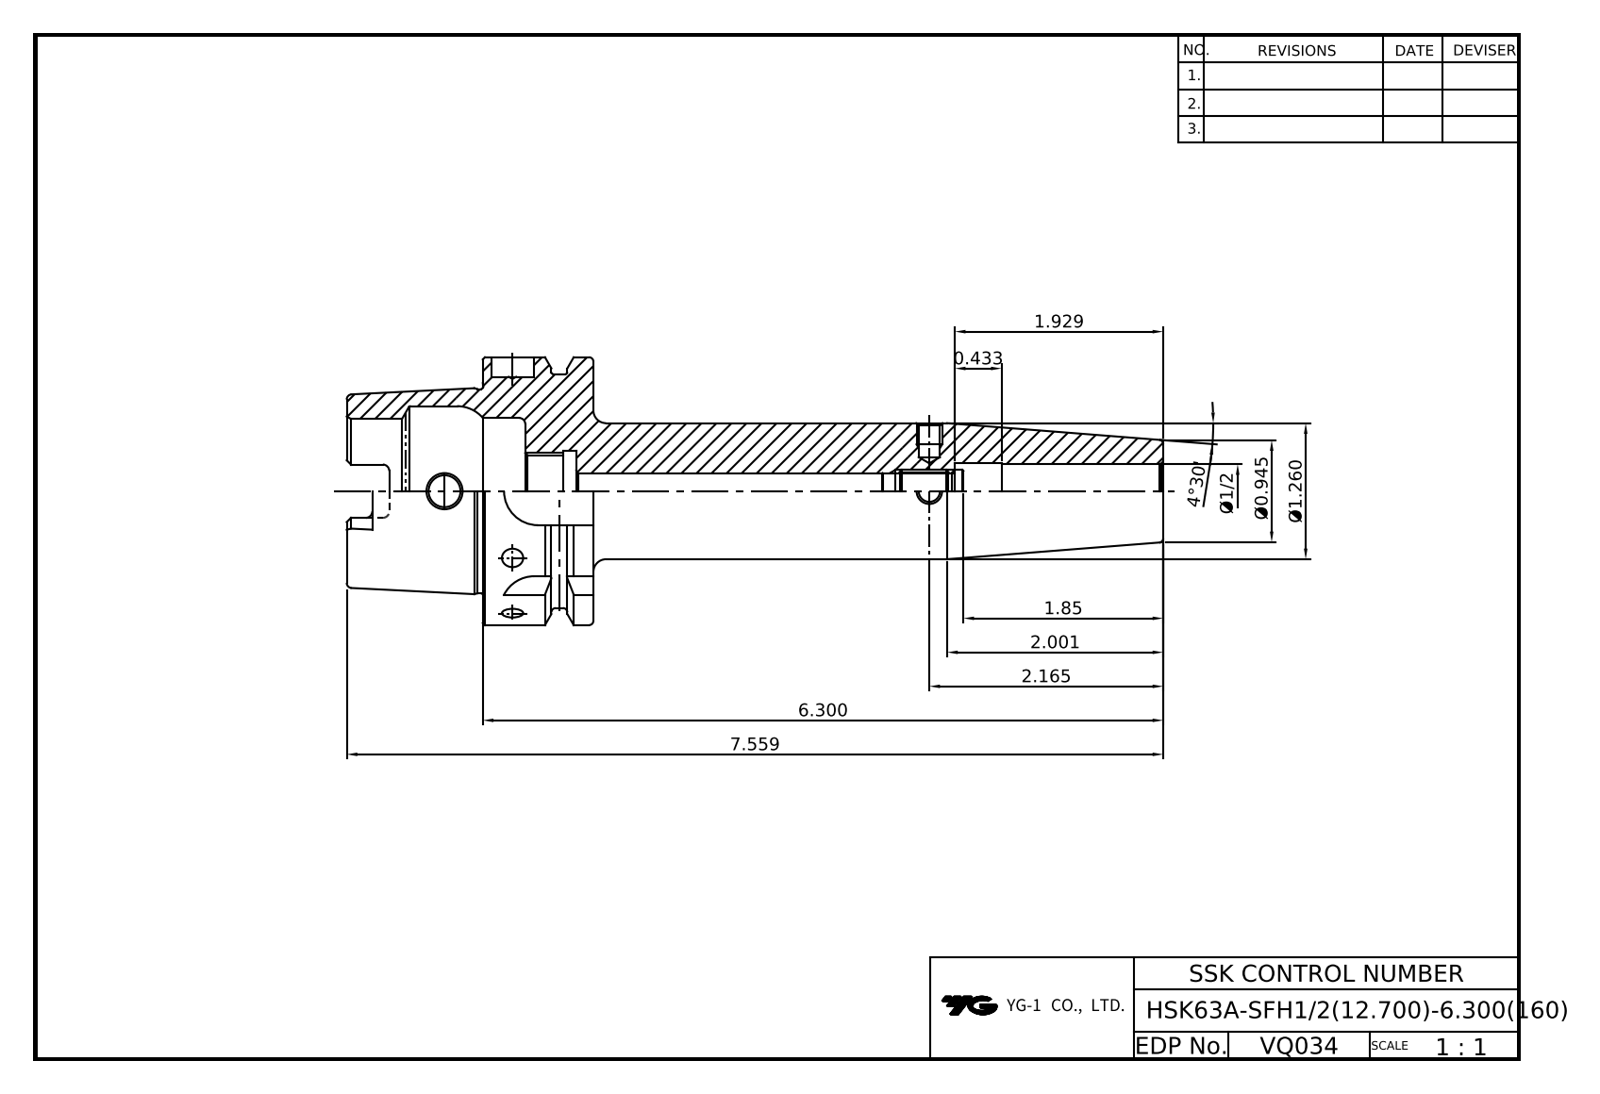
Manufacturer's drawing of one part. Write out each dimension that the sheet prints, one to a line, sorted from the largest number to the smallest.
7.559
6.300
4°30'
2.165
2.001
1.929
1.85
Ø1.260
Ø0.945
0.433
